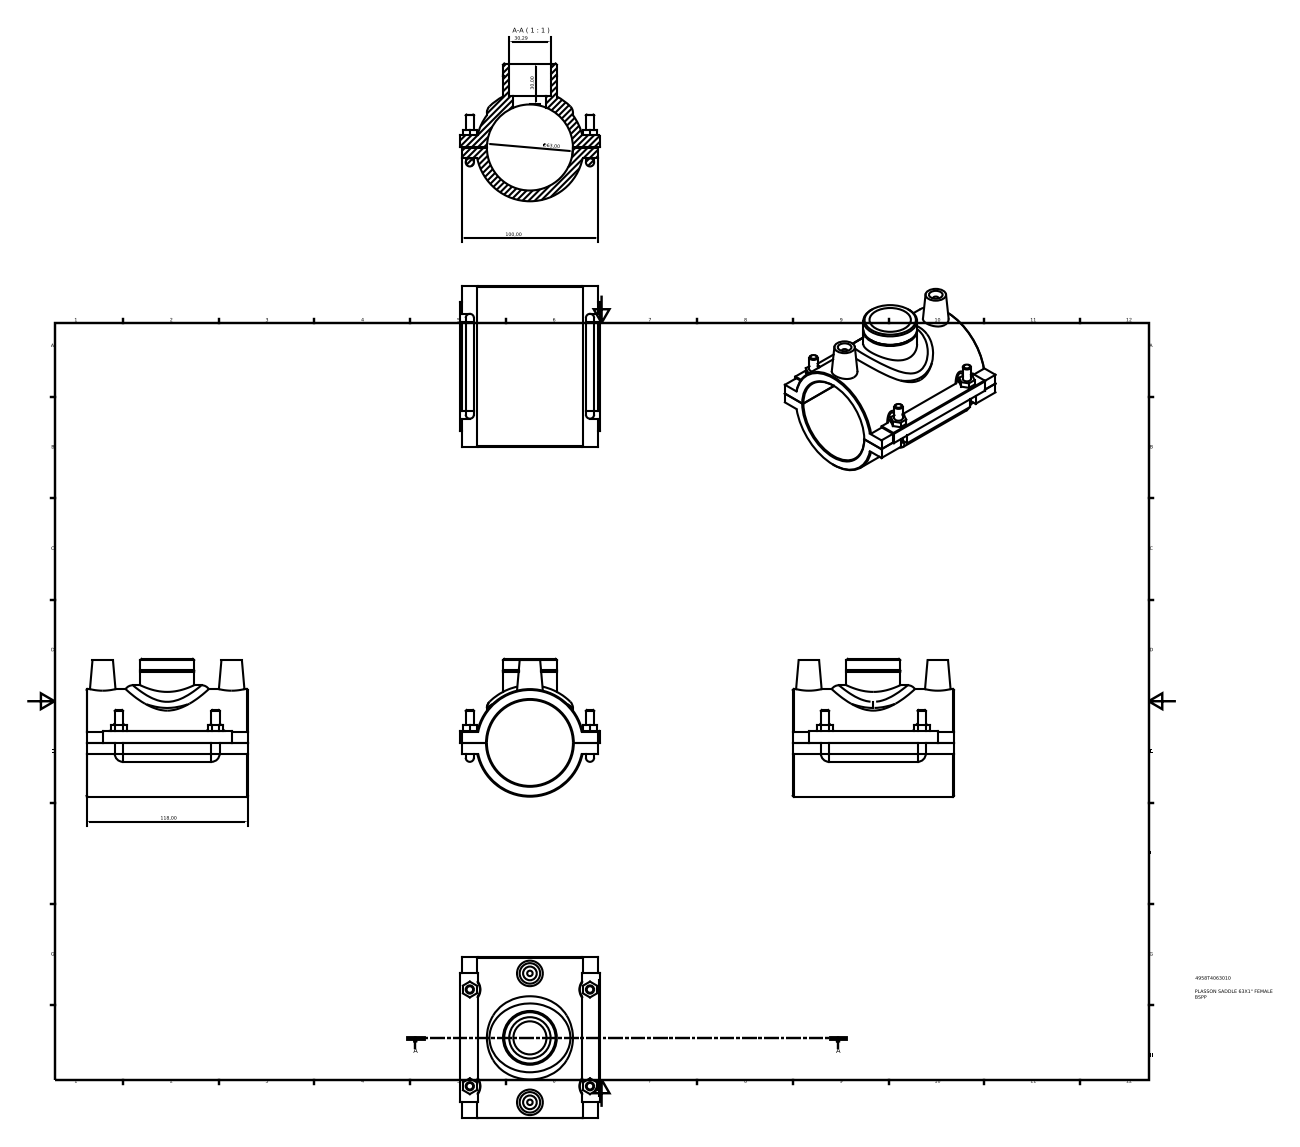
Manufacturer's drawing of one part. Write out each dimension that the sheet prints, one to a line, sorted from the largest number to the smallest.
118,00
100,00
∅63,00
30,29
30,00
